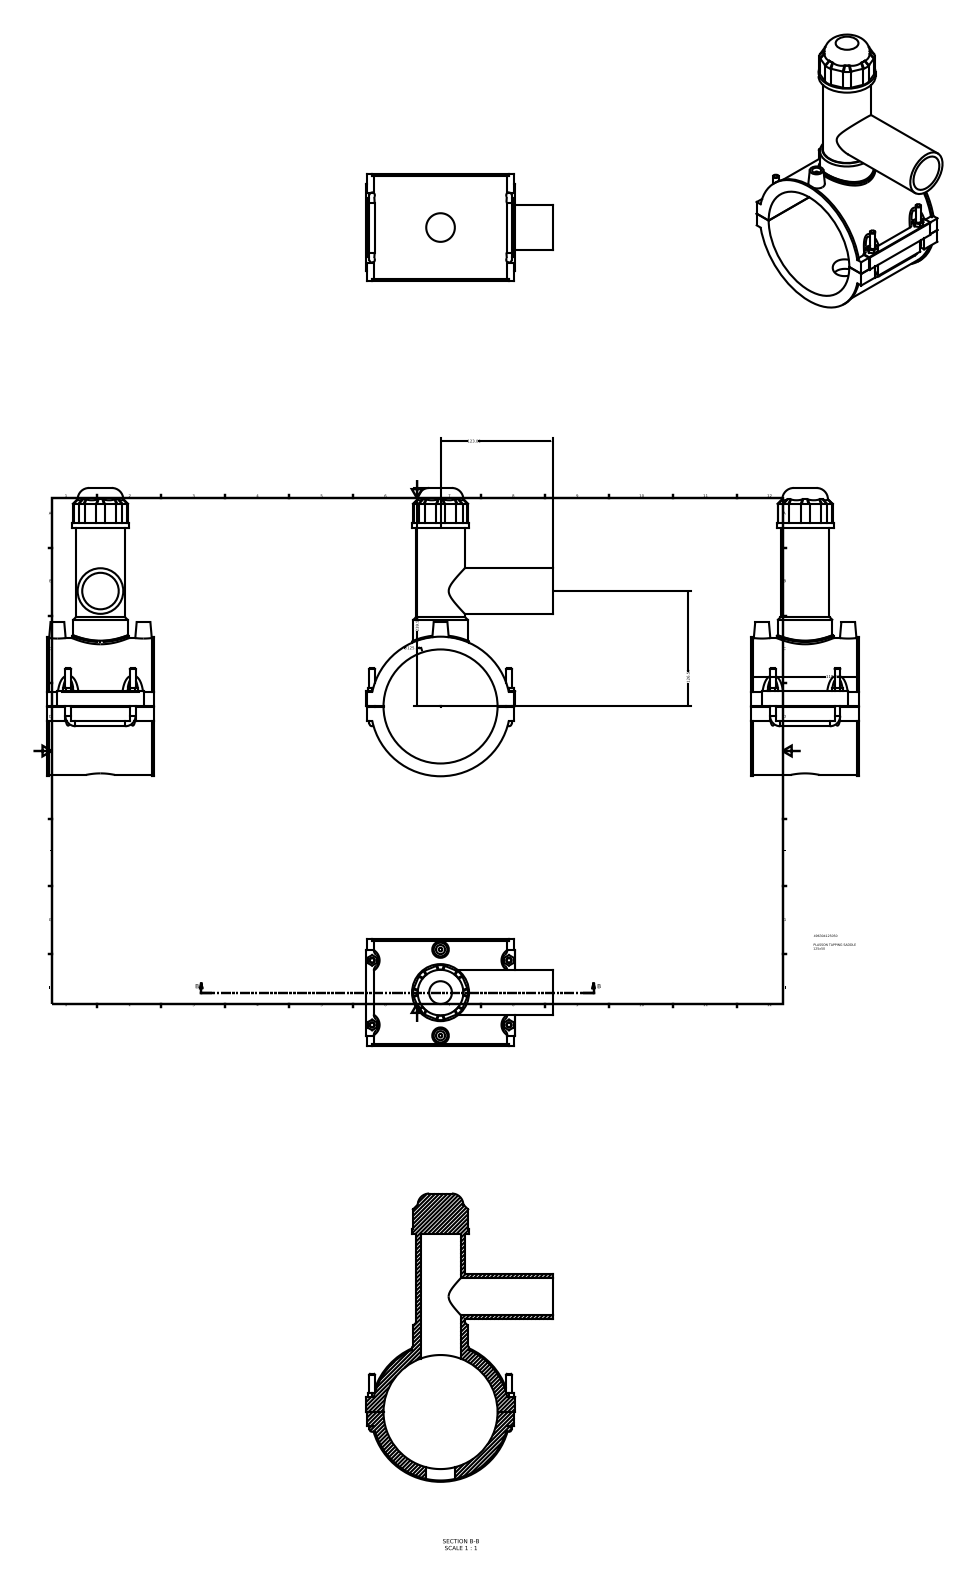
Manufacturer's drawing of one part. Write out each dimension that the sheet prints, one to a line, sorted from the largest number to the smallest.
239.50
126.50
∅125.00
123.00
118.00
